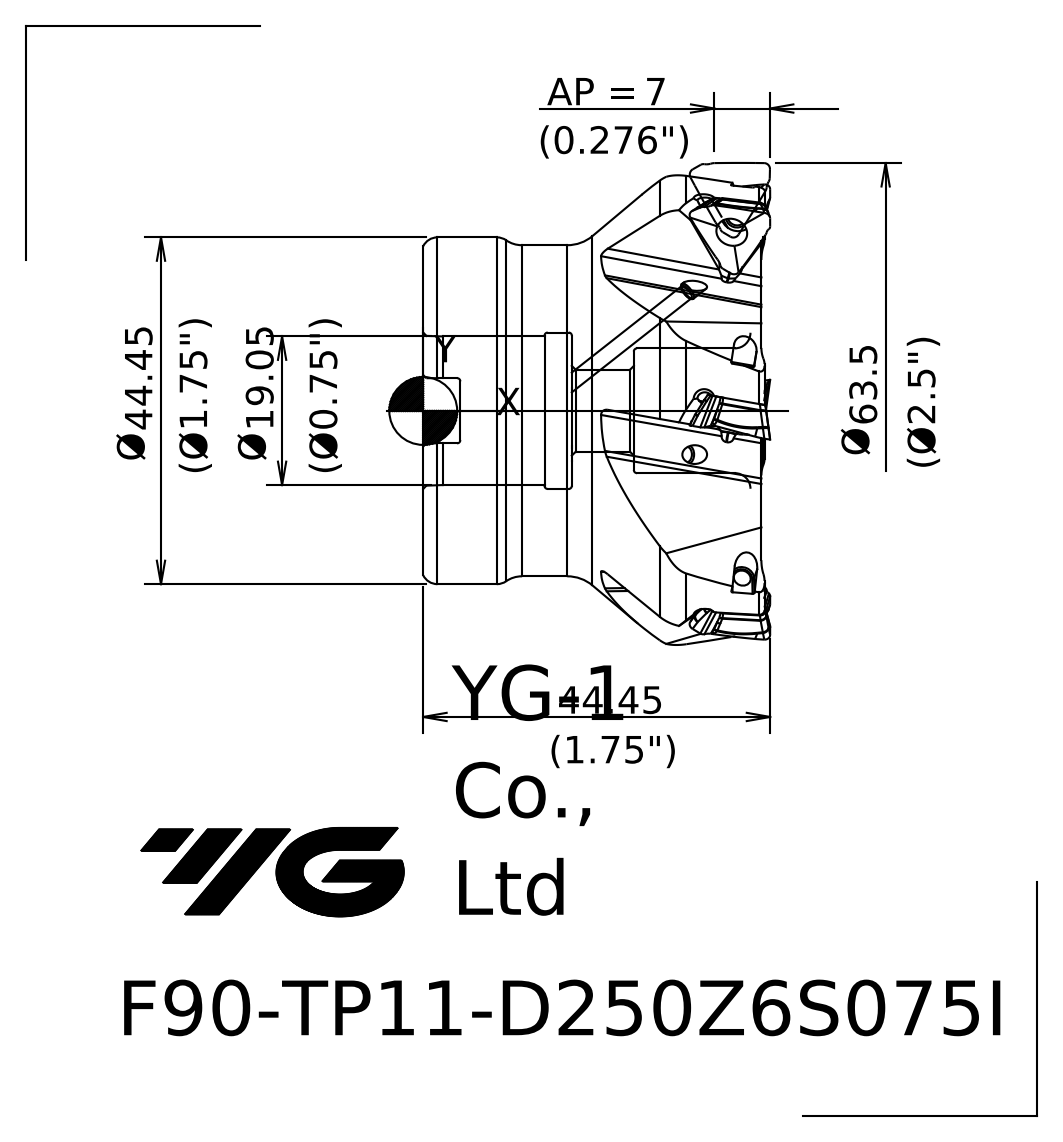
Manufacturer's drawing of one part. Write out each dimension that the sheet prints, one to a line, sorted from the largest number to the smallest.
63.5 Ø
44.45
19.05 Ø
AP = 7
